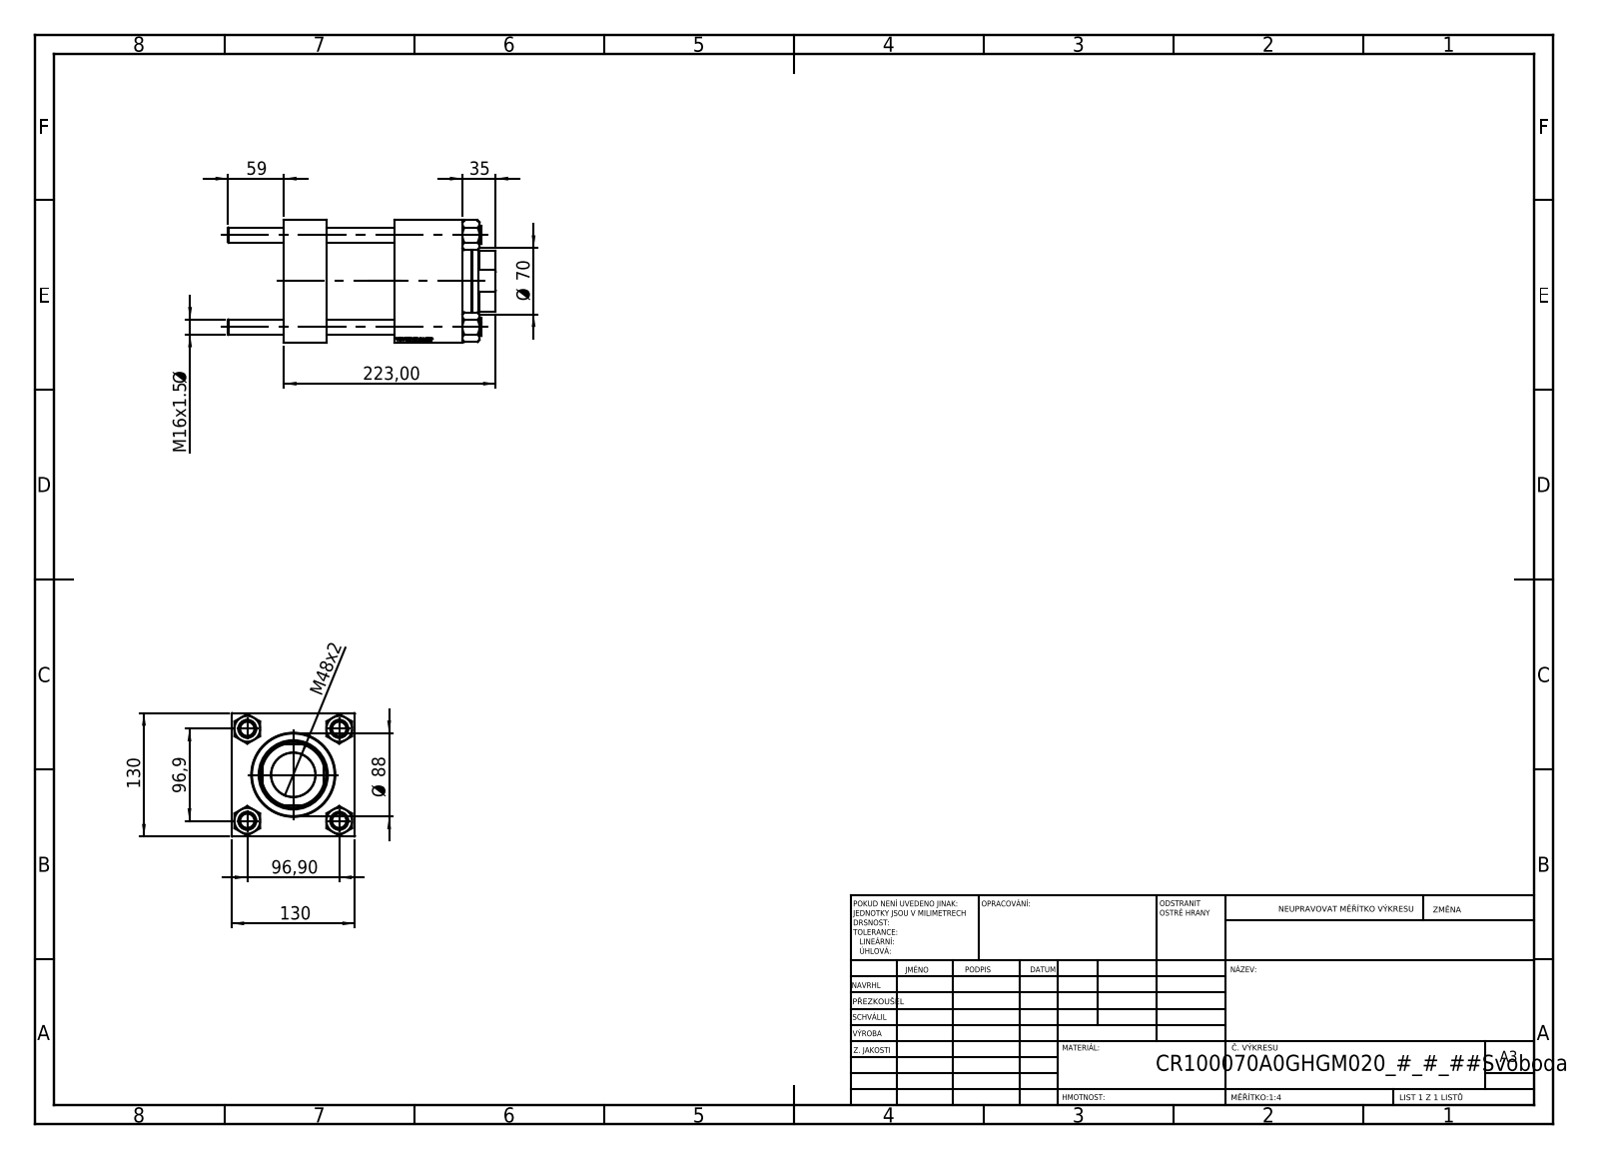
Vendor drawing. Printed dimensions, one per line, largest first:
223,00
130
130
96,9
96,90
Ø 88
Ø 70
59
M48x2
35
M16x1.5 Ø
